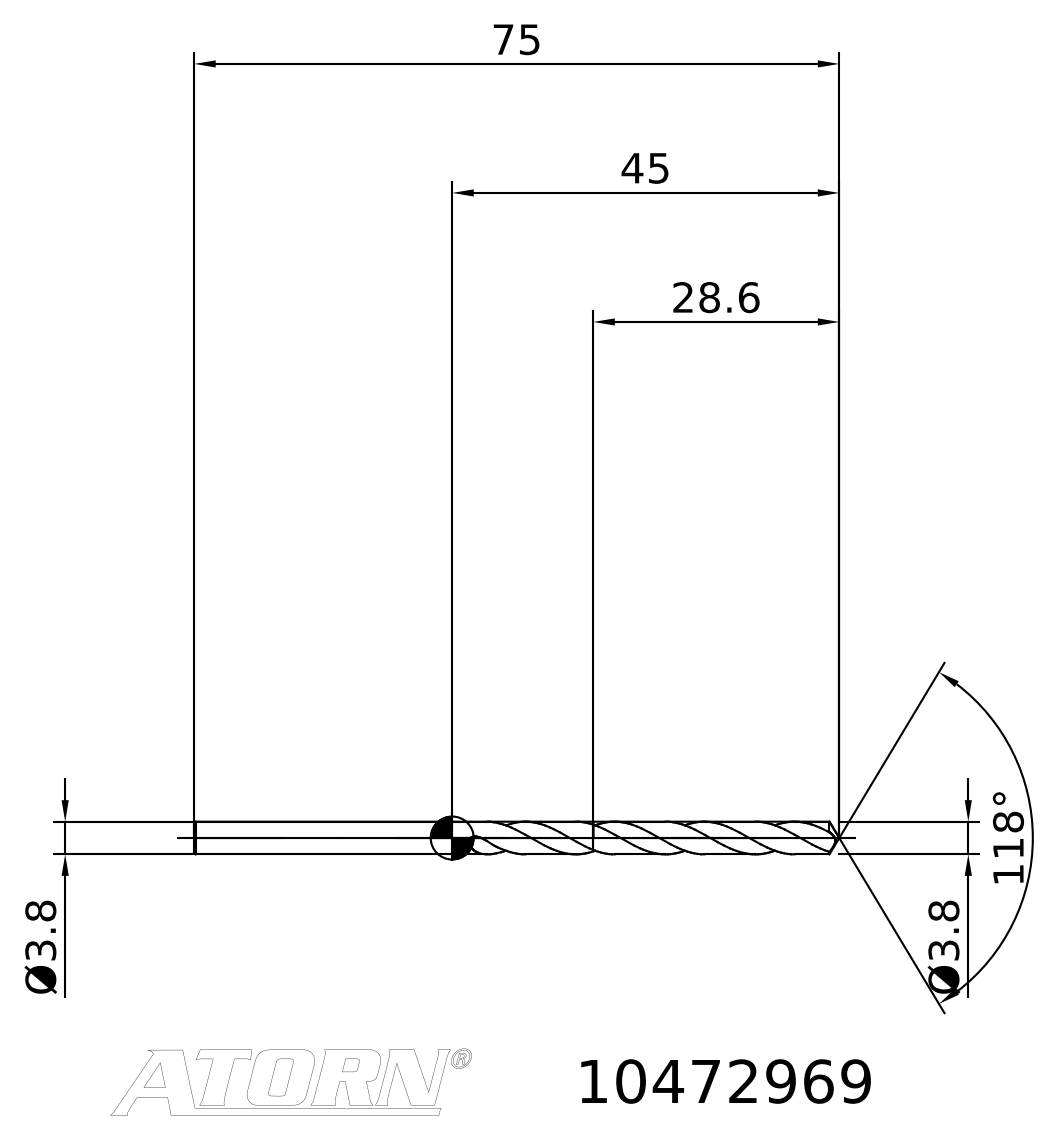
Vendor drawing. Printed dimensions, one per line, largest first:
118°
75
45
28.6
Ø3.8
Ø3.8
